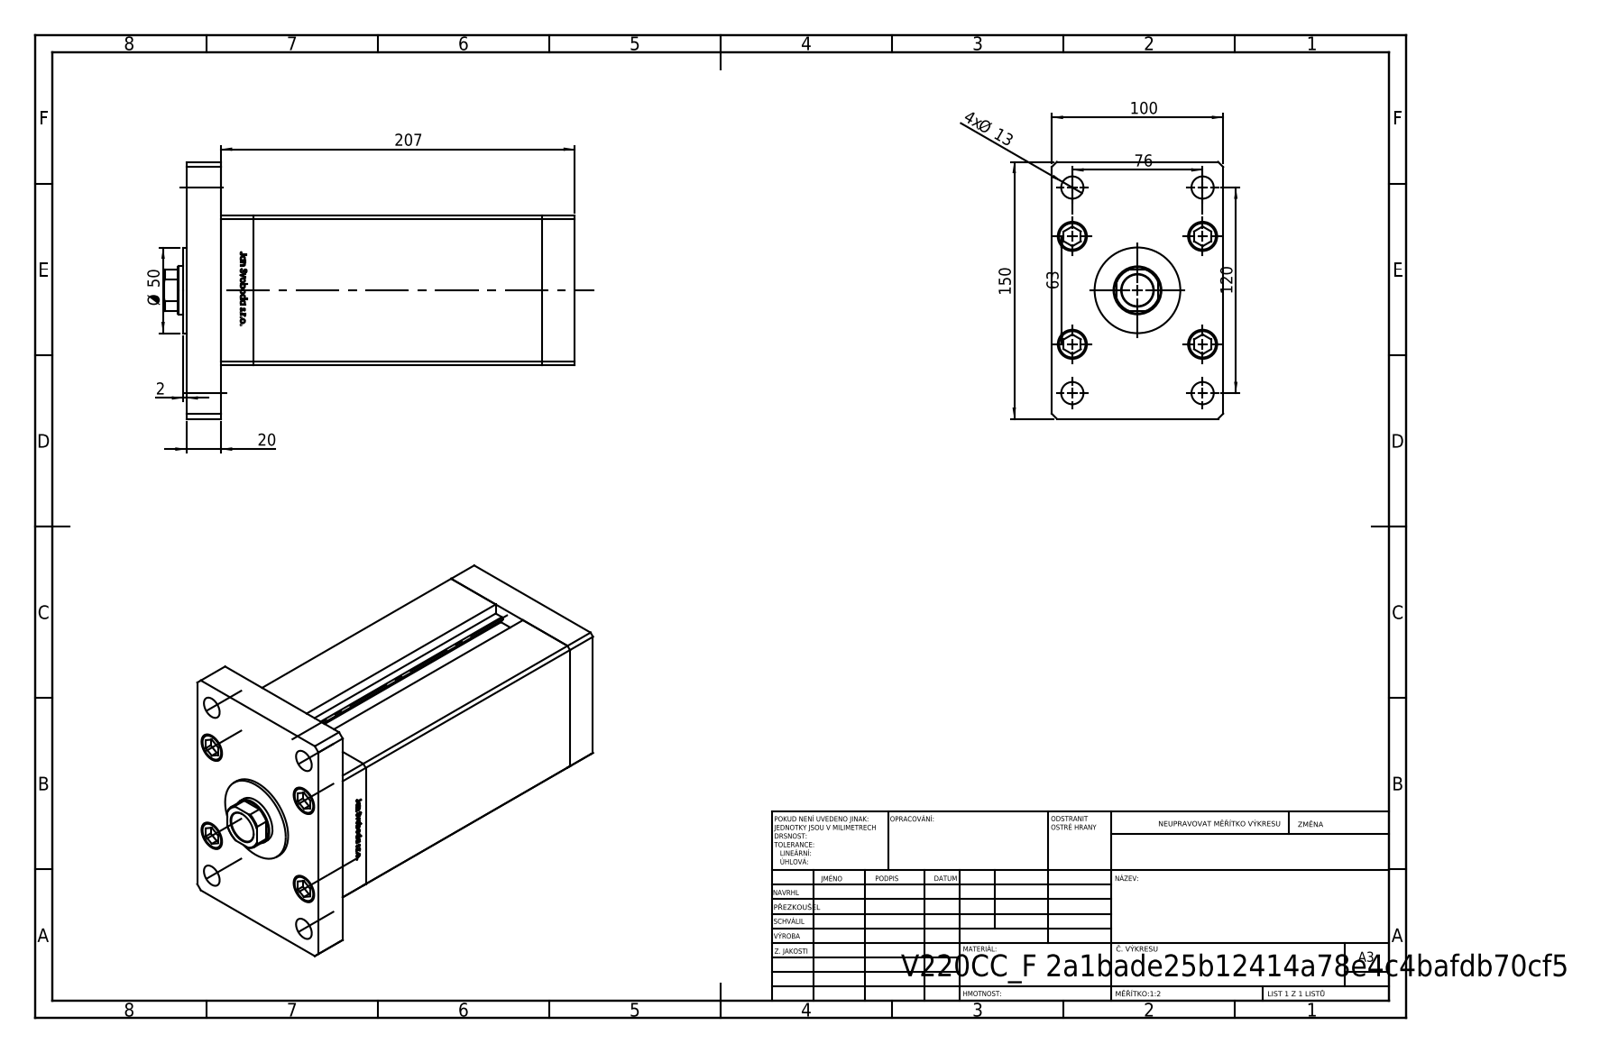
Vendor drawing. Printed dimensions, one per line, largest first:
207
150
120
100
76
63
Ø 50
20
4x Ø 13
2
